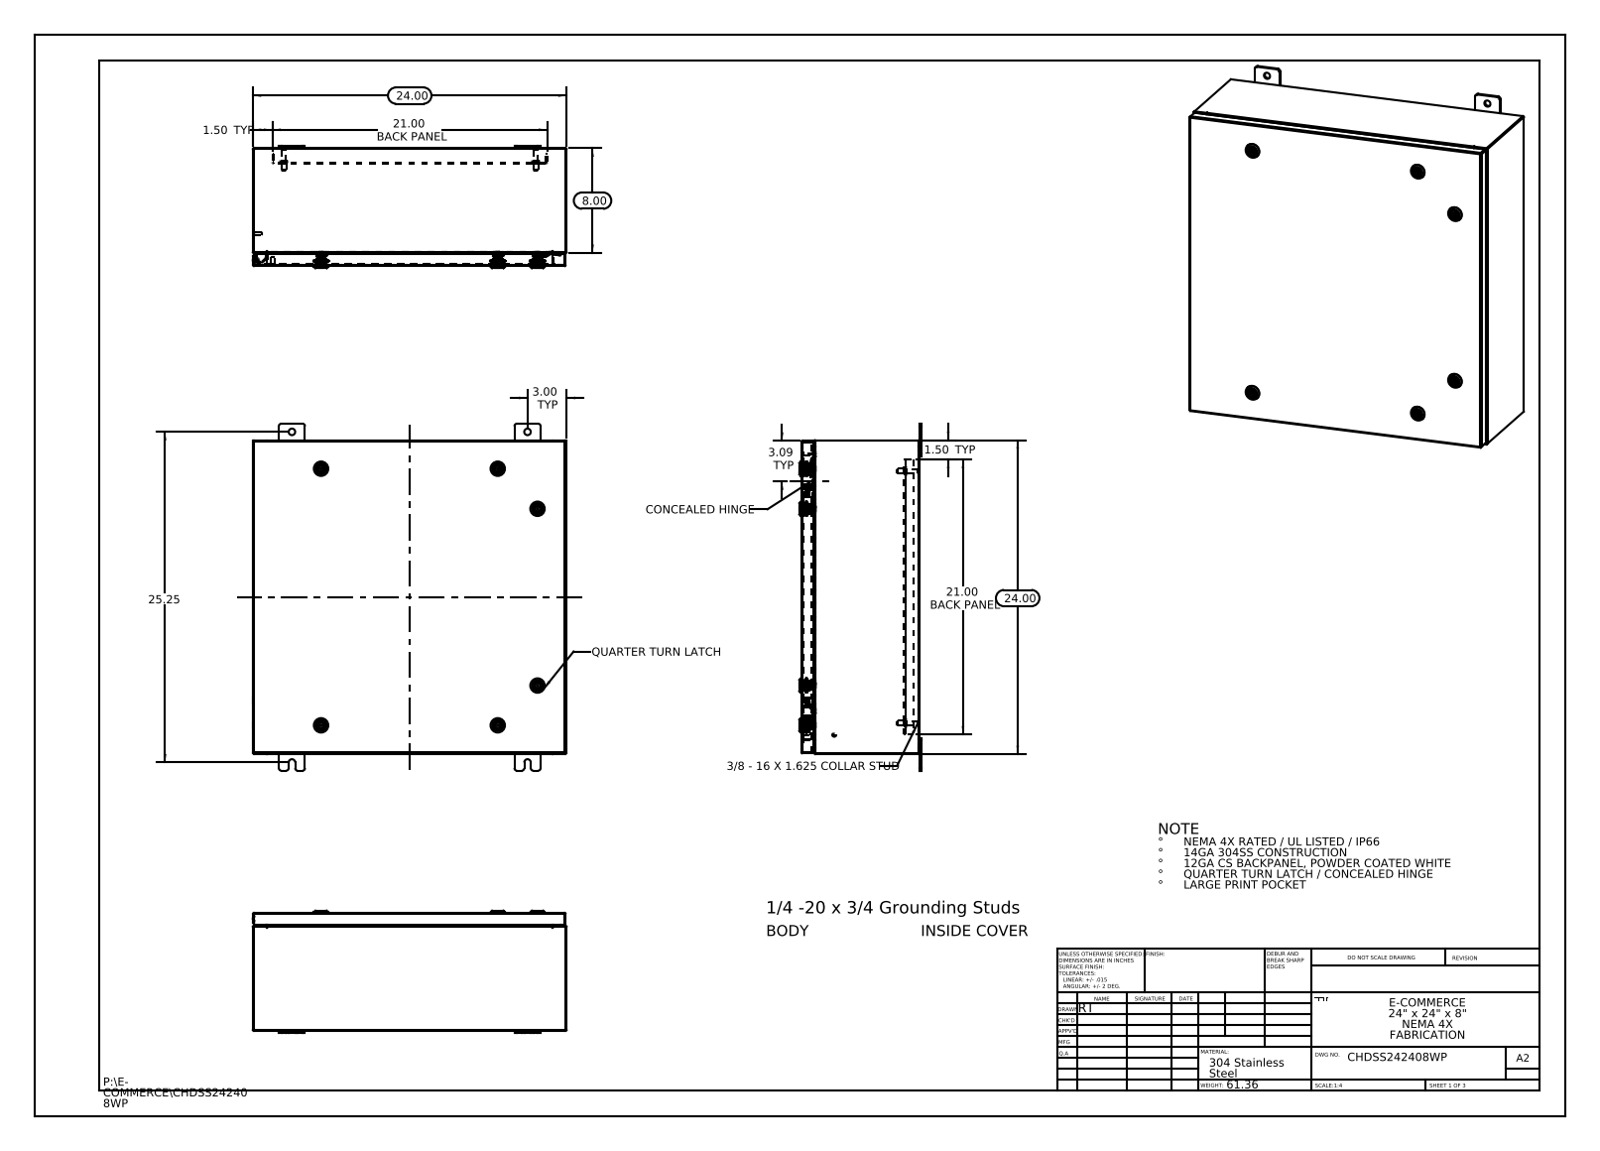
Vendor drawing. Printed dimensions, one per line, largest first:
25.25
24.00
24.00
21.00 BACK PANEL
21.00 BACK PANEL
8.00
3.09 TYP
3.00 TYP
1.50 TYP
1.50 TYP
